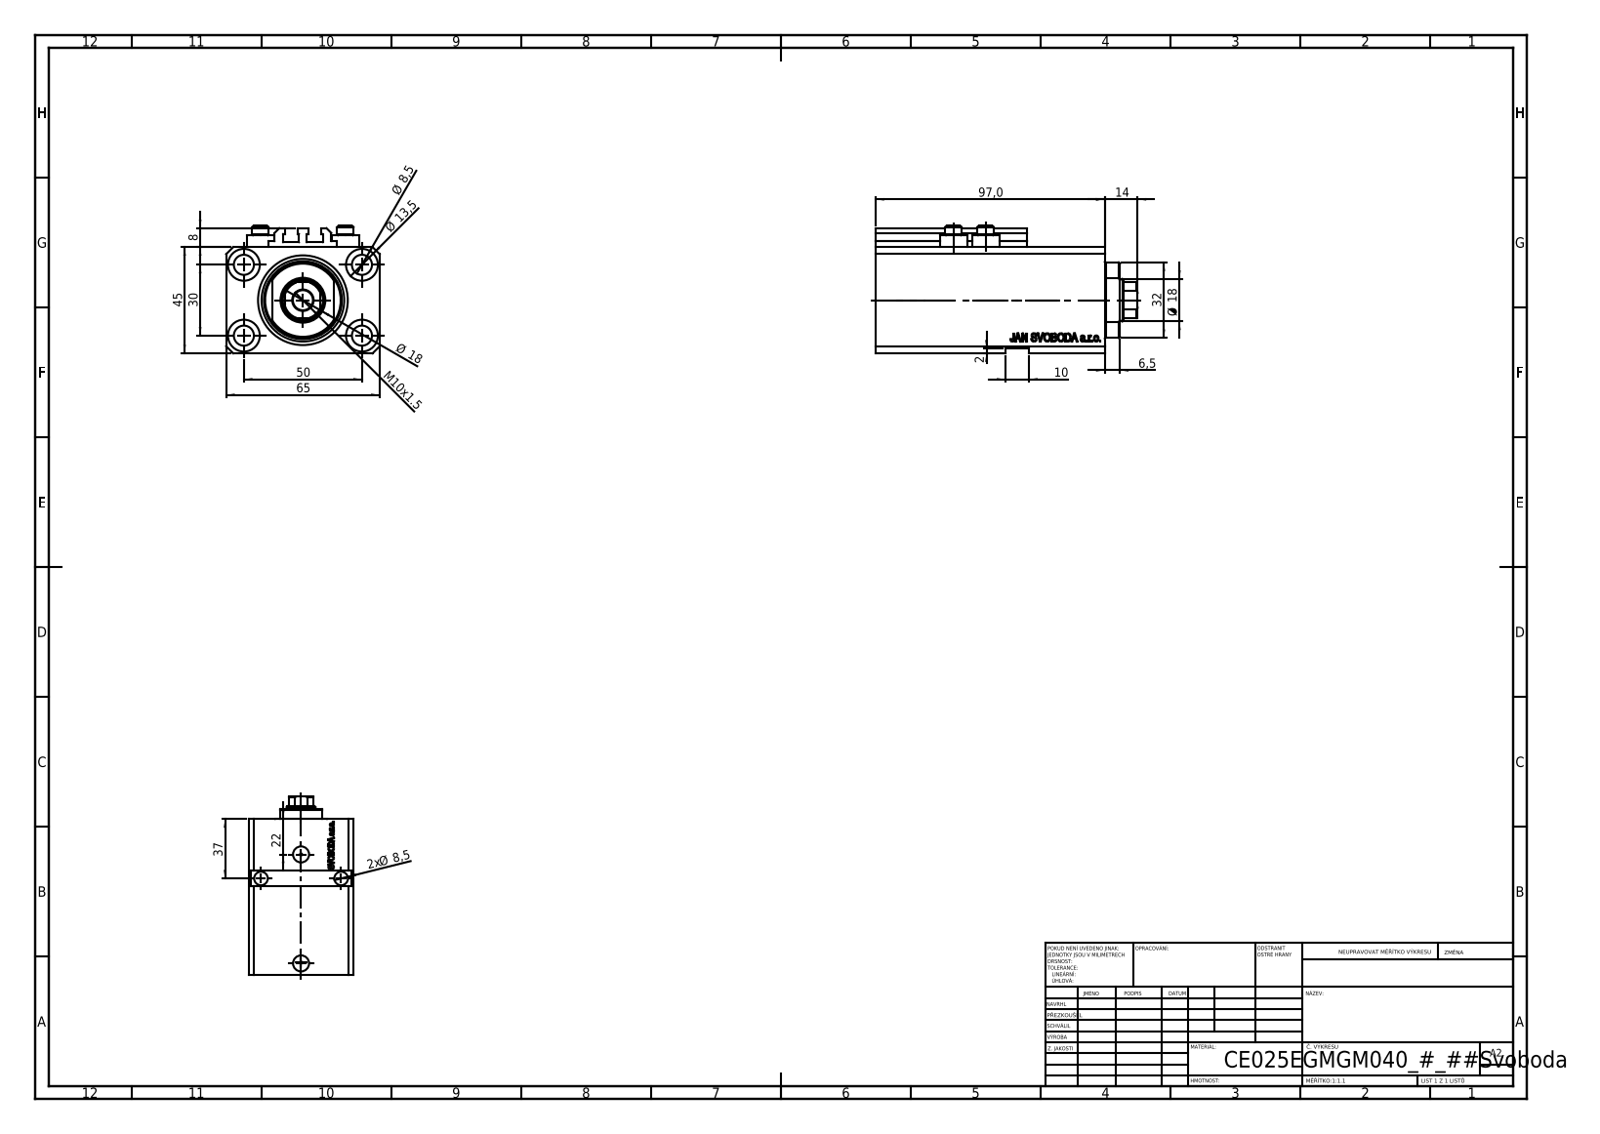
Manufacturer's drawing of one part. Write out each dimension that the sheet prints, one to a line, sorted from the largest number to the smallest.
97,0
65
50
45
37
32
30
22
Ø 18
Ø 18
14
Ø 13,5
M10x1.5
10
Ø 8,5
2x Ø 8,5
8
6,5
2
